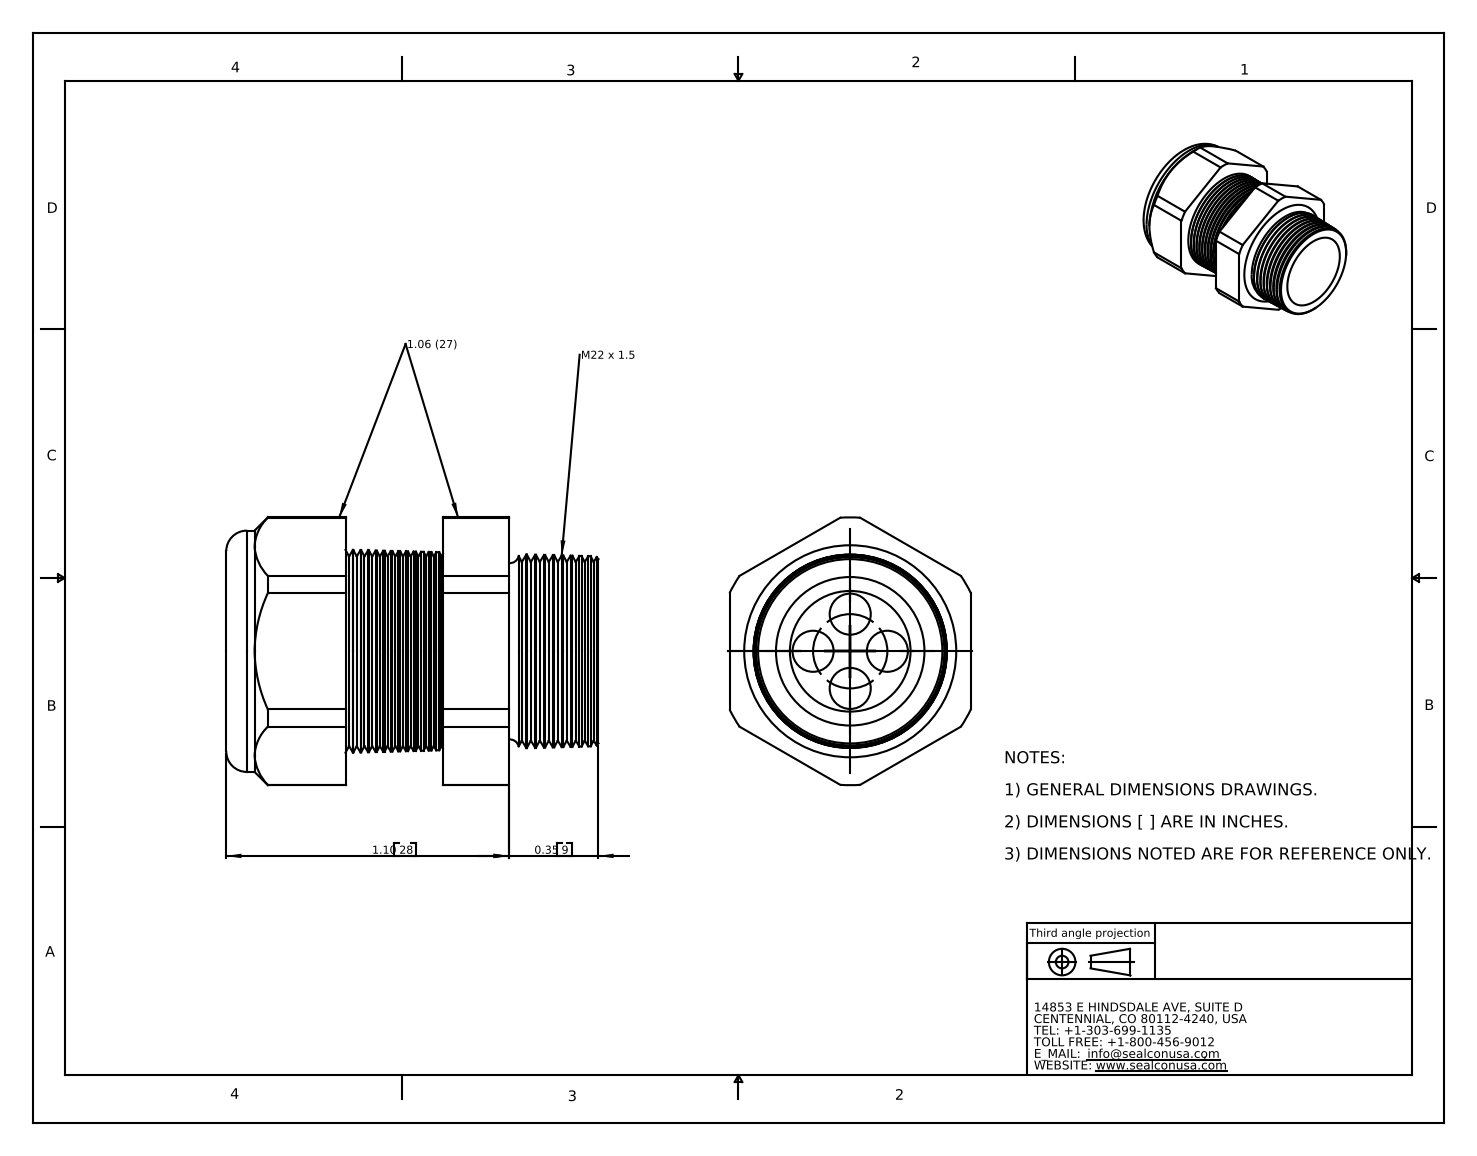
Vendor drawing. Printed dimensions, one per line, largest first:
1.10 28
0.35 9
